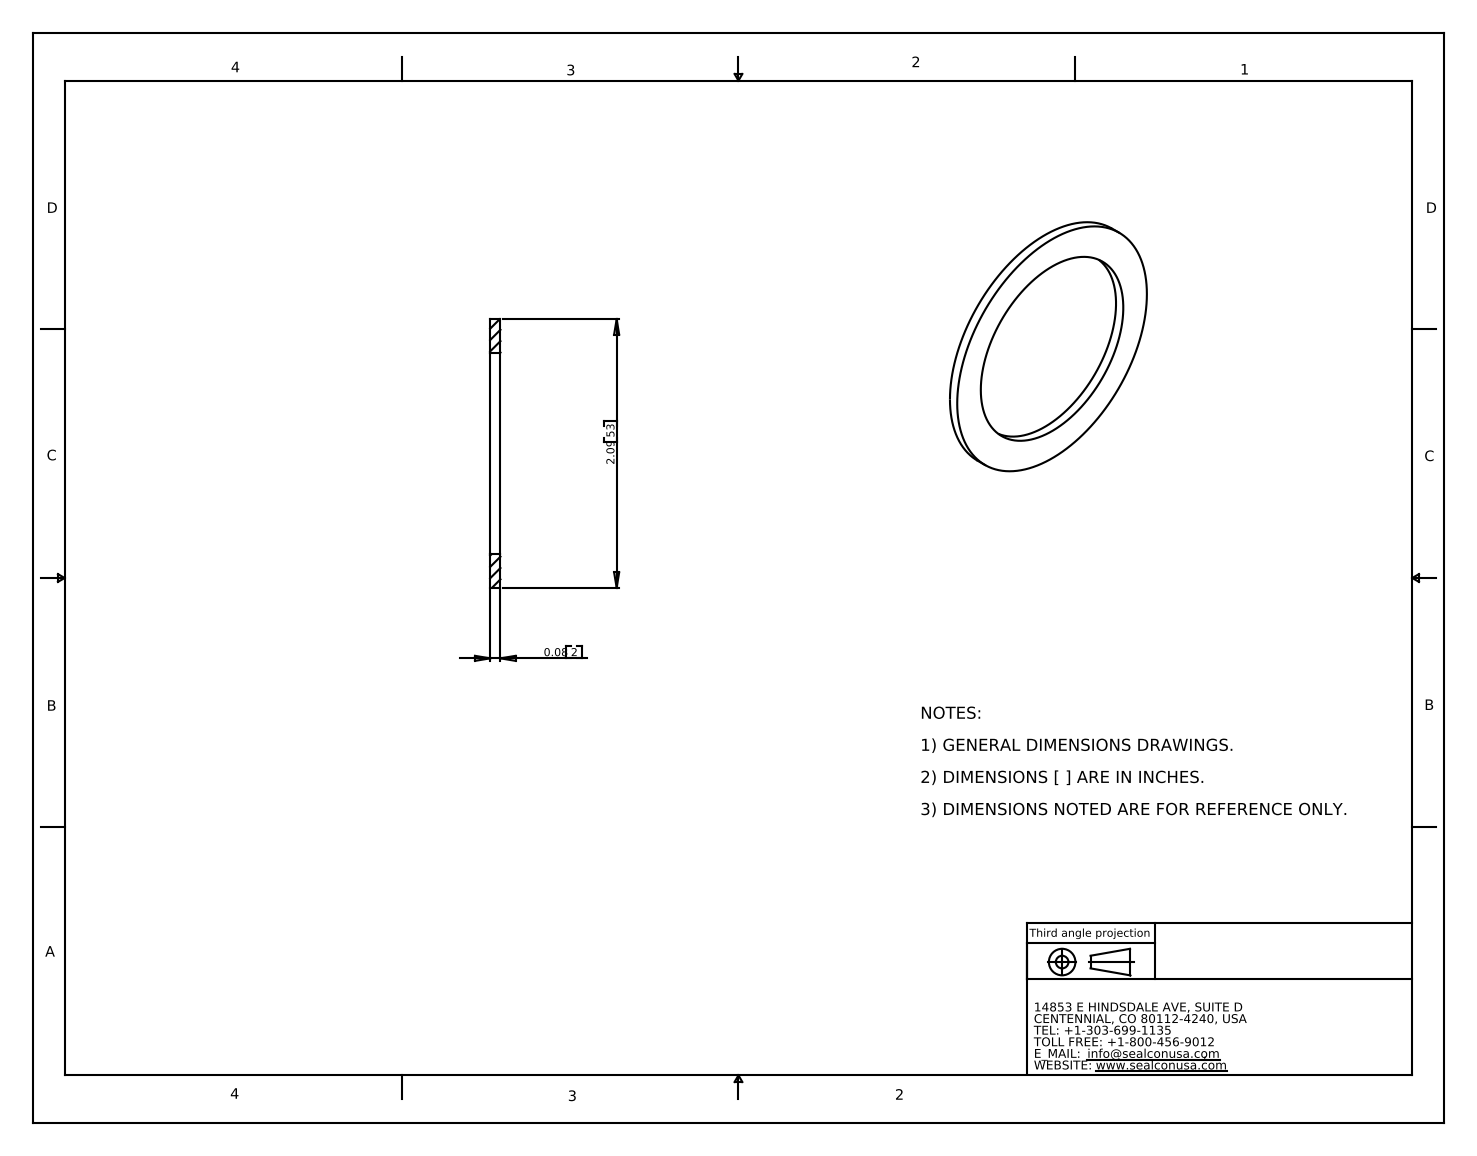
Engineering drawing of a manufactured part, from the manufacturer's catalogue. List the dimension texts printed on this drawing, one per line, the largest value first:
2.09 53
0.08 2
